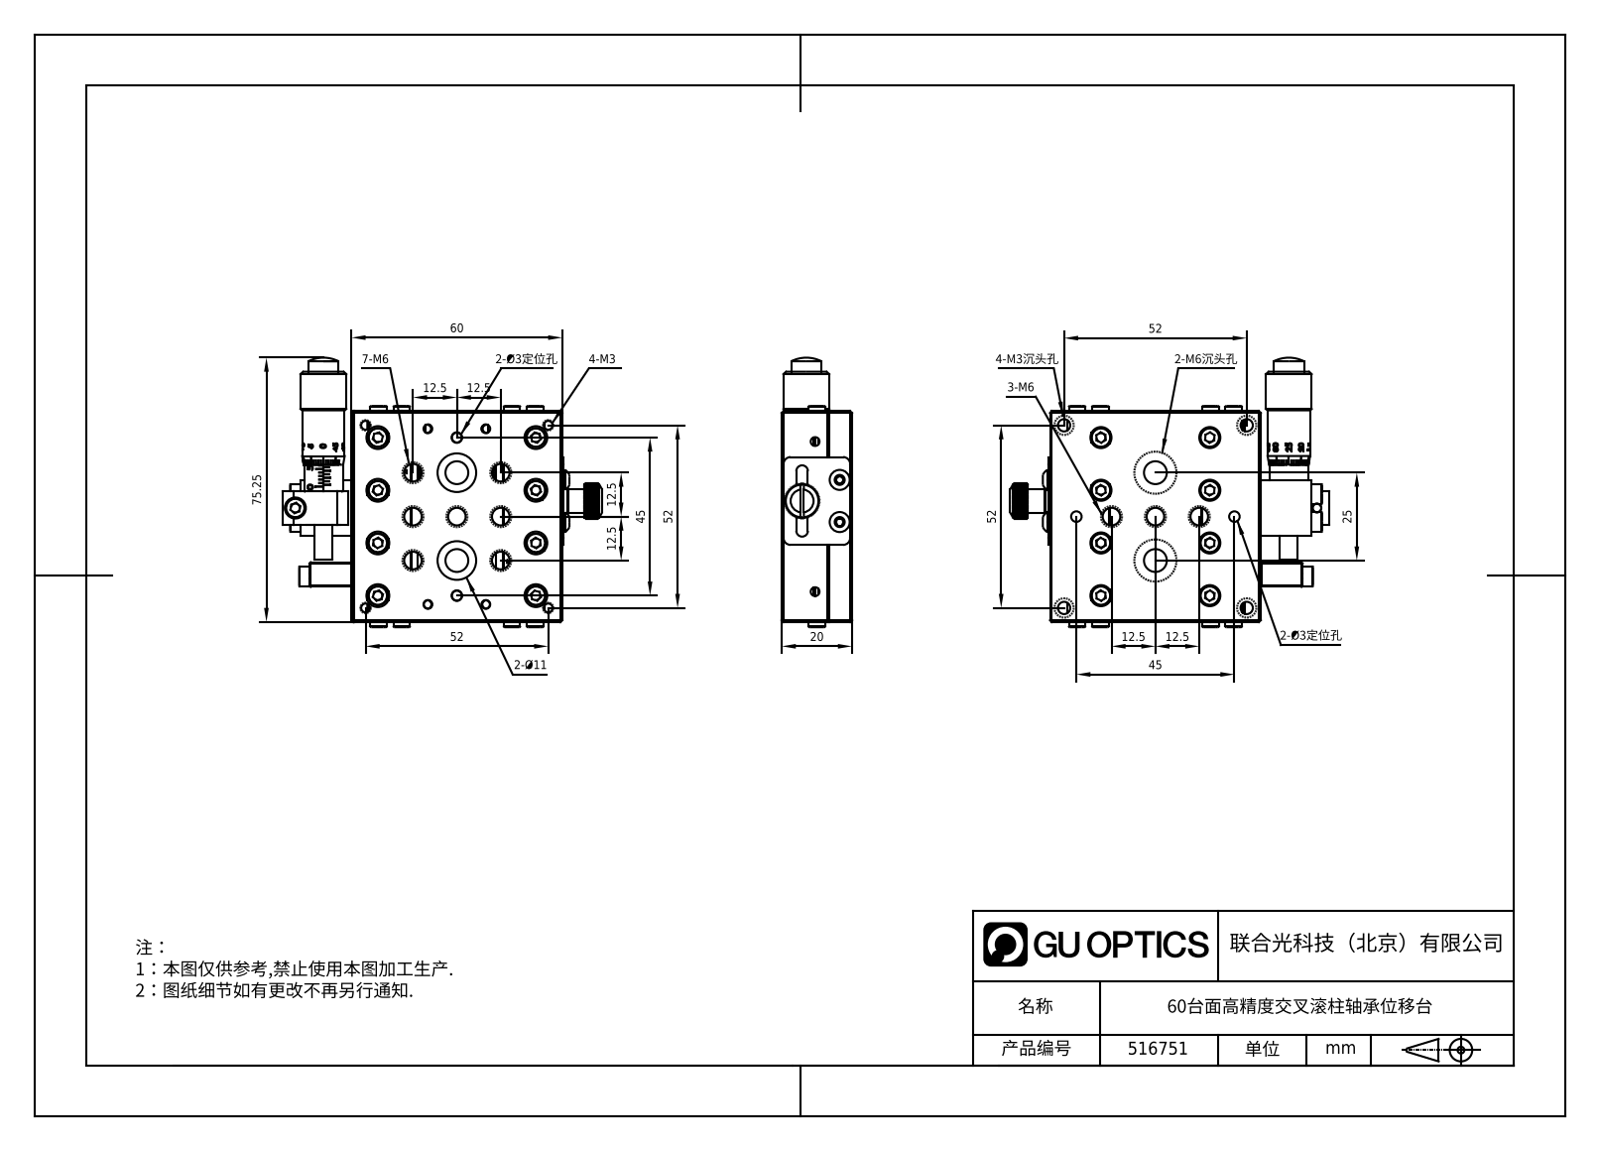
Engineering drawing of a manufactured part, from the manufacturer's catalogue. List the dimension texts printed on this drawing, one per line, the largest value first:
75.25
60
52
52
52
52
45
45
25
20
12.5
12.5
12.5
12.5
12.5
12.5
